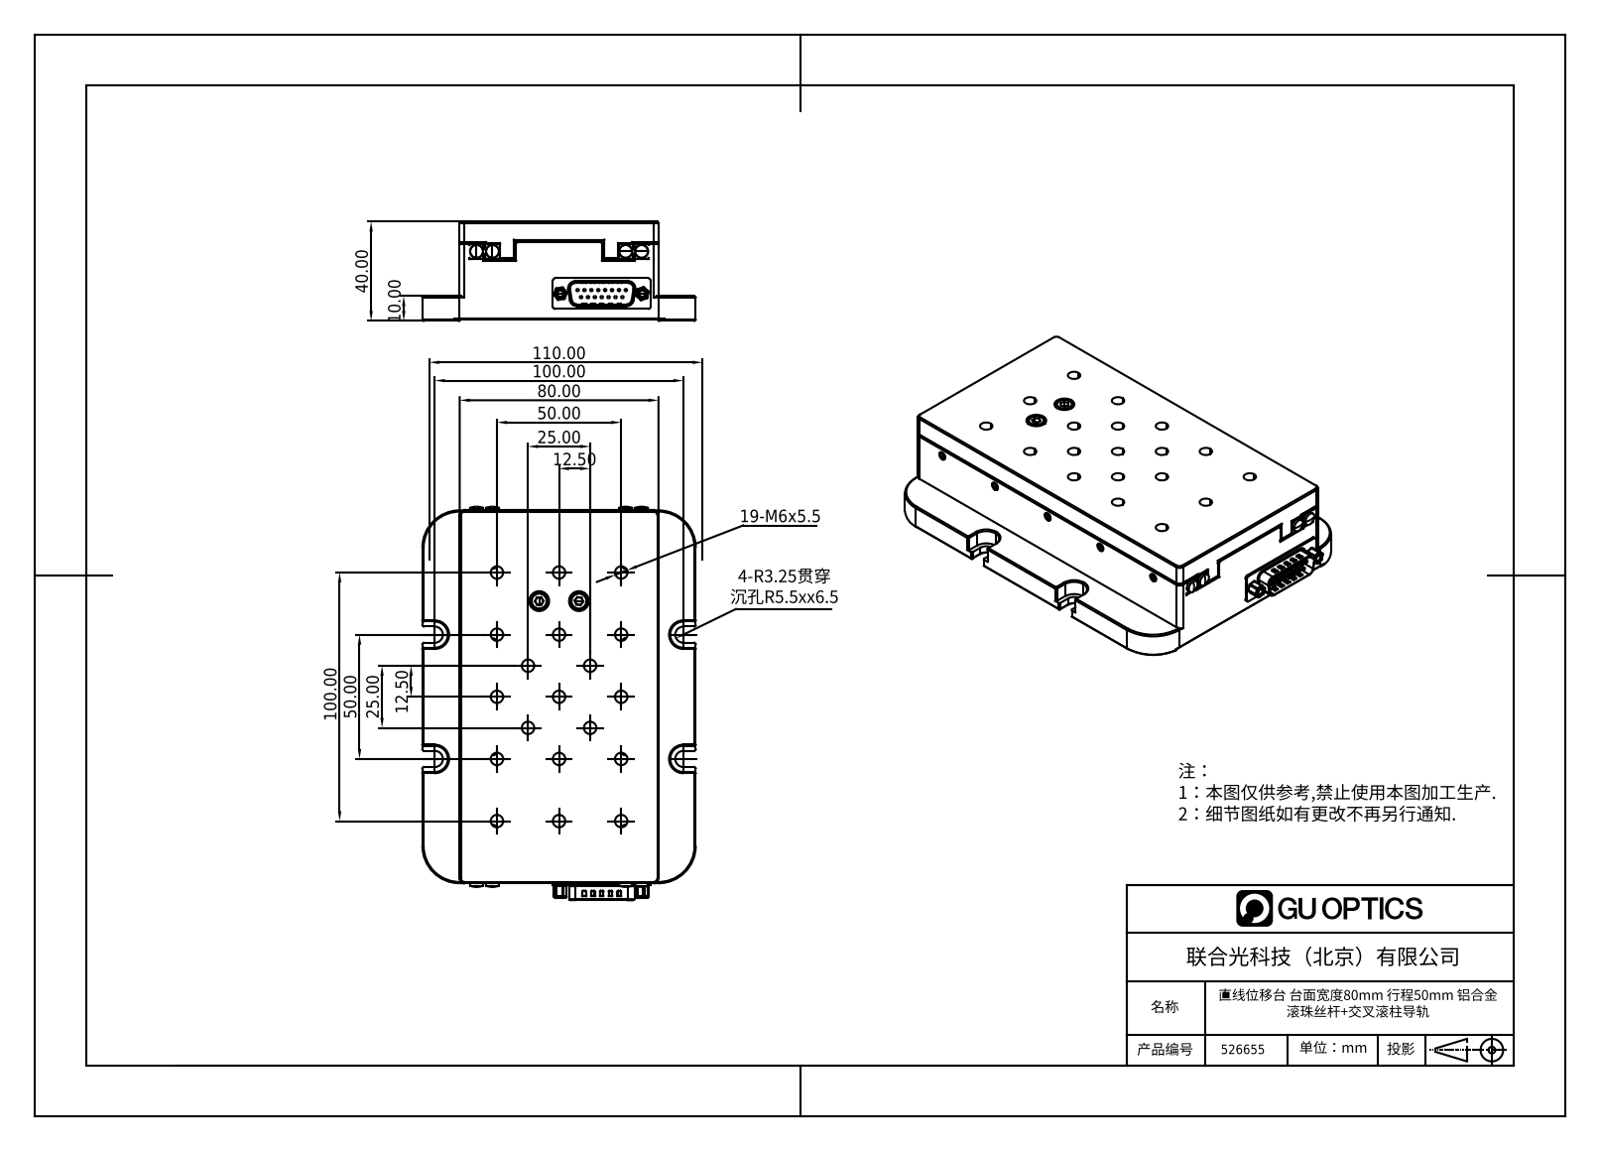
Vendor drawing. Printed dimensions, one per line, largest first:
110.00
100.00
100.00
80.00
50.00
50.00
40.00
25.00
25.00
12.50
12.50
10.00
19-M6x5.5
4-R3.25贯穿 沉孔R5.5xx6.5
